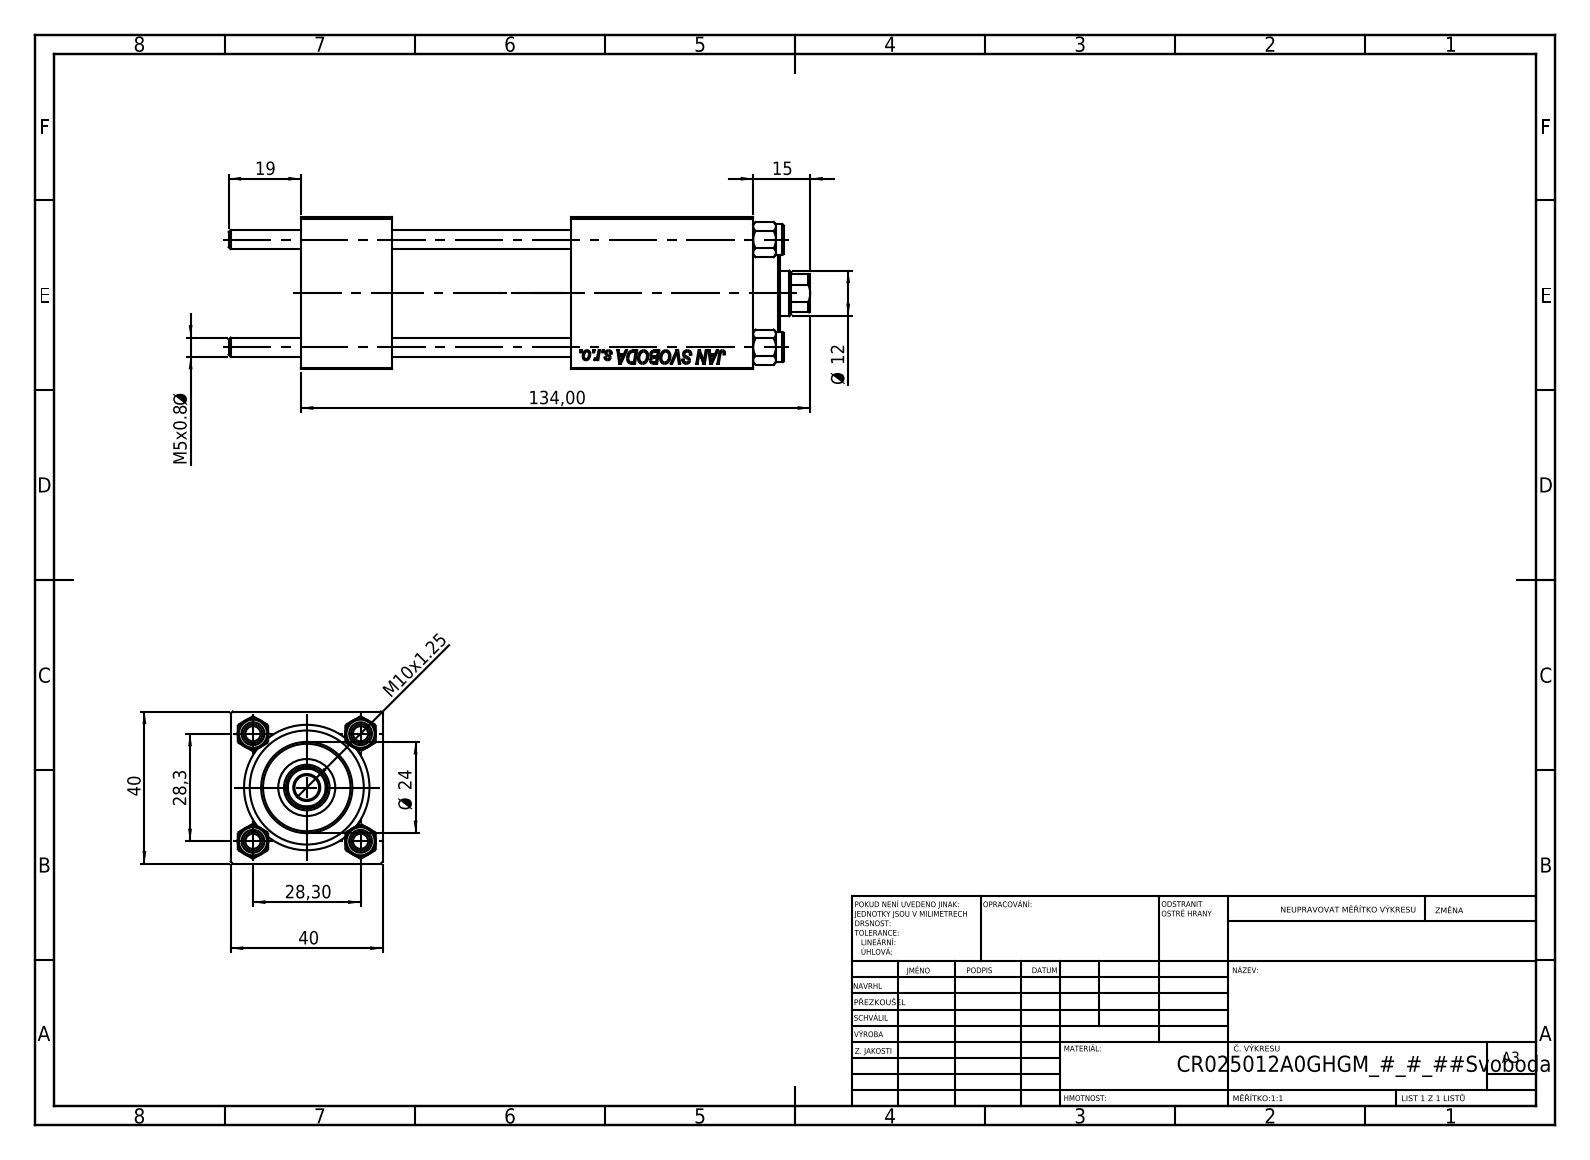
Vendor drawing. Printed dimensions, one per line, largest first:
134,00
40
40
28,3
28,30
Ø 24
19
15
Ø 12
M10x1.25
M5x0.8 Ø
